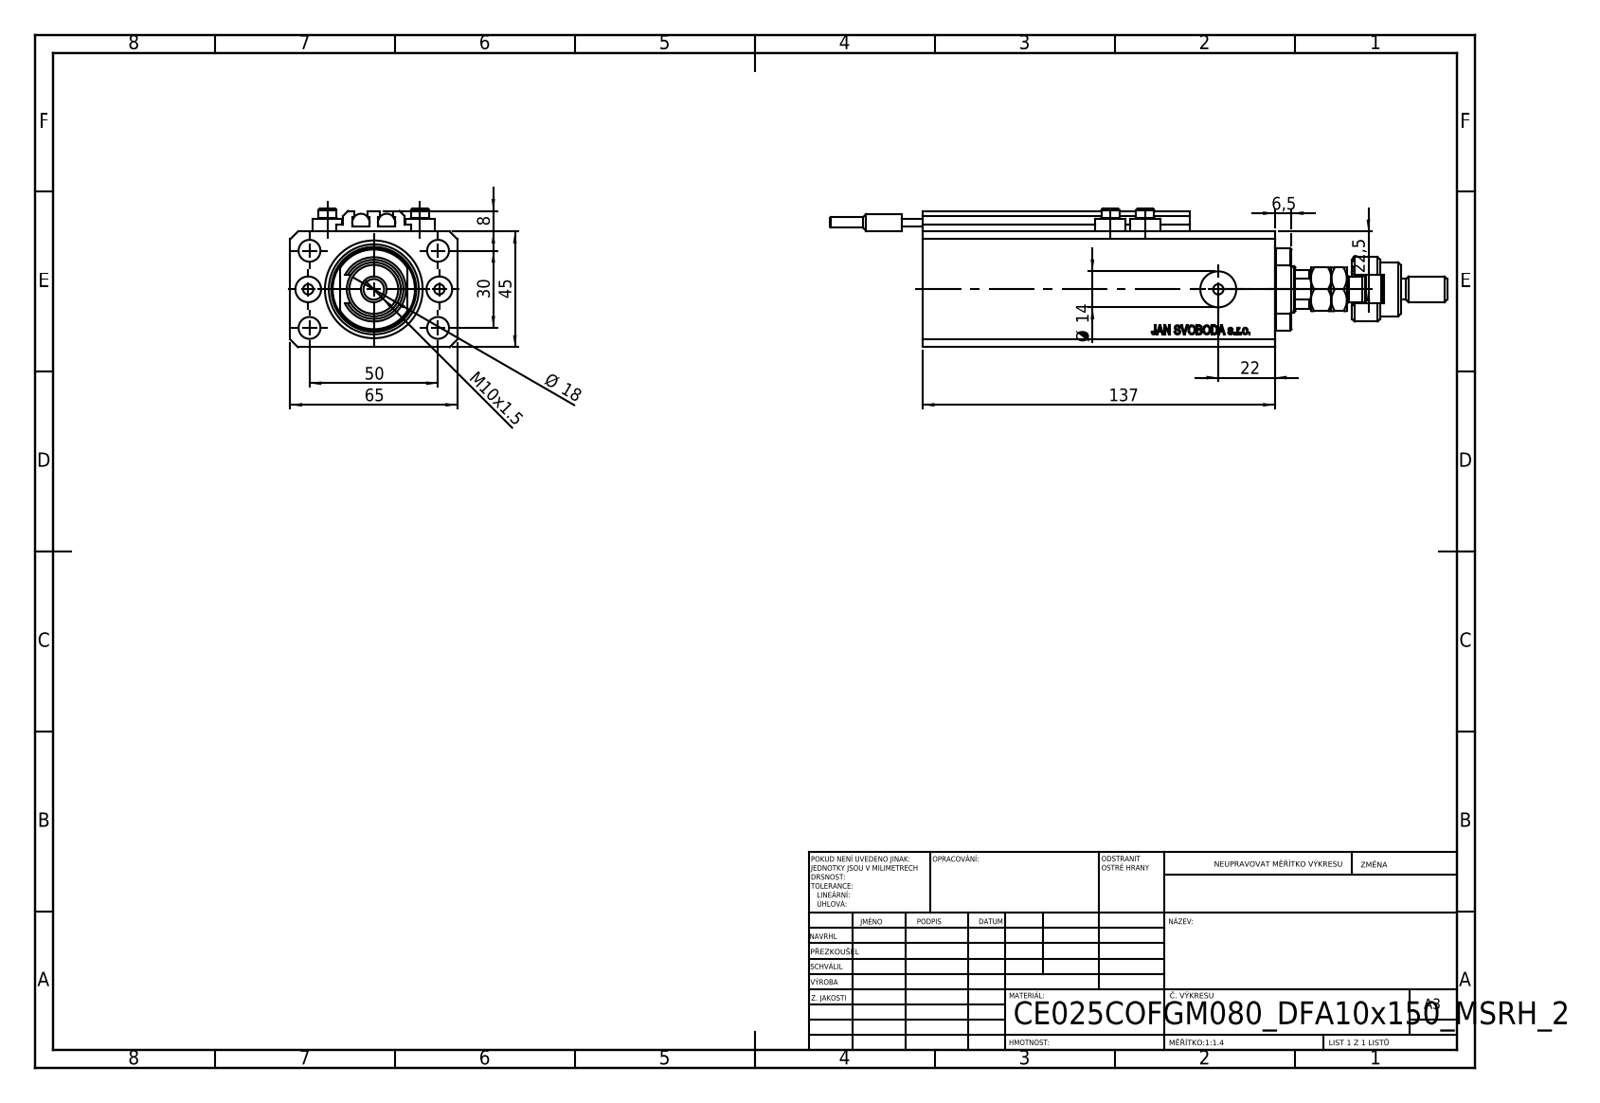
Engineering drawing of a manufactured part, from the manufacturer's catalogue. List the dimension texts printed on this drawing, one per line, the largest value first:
137
65
50
45
30
22,5
22
Ø 18
Ø 14
M10x1.5
8
6,5
